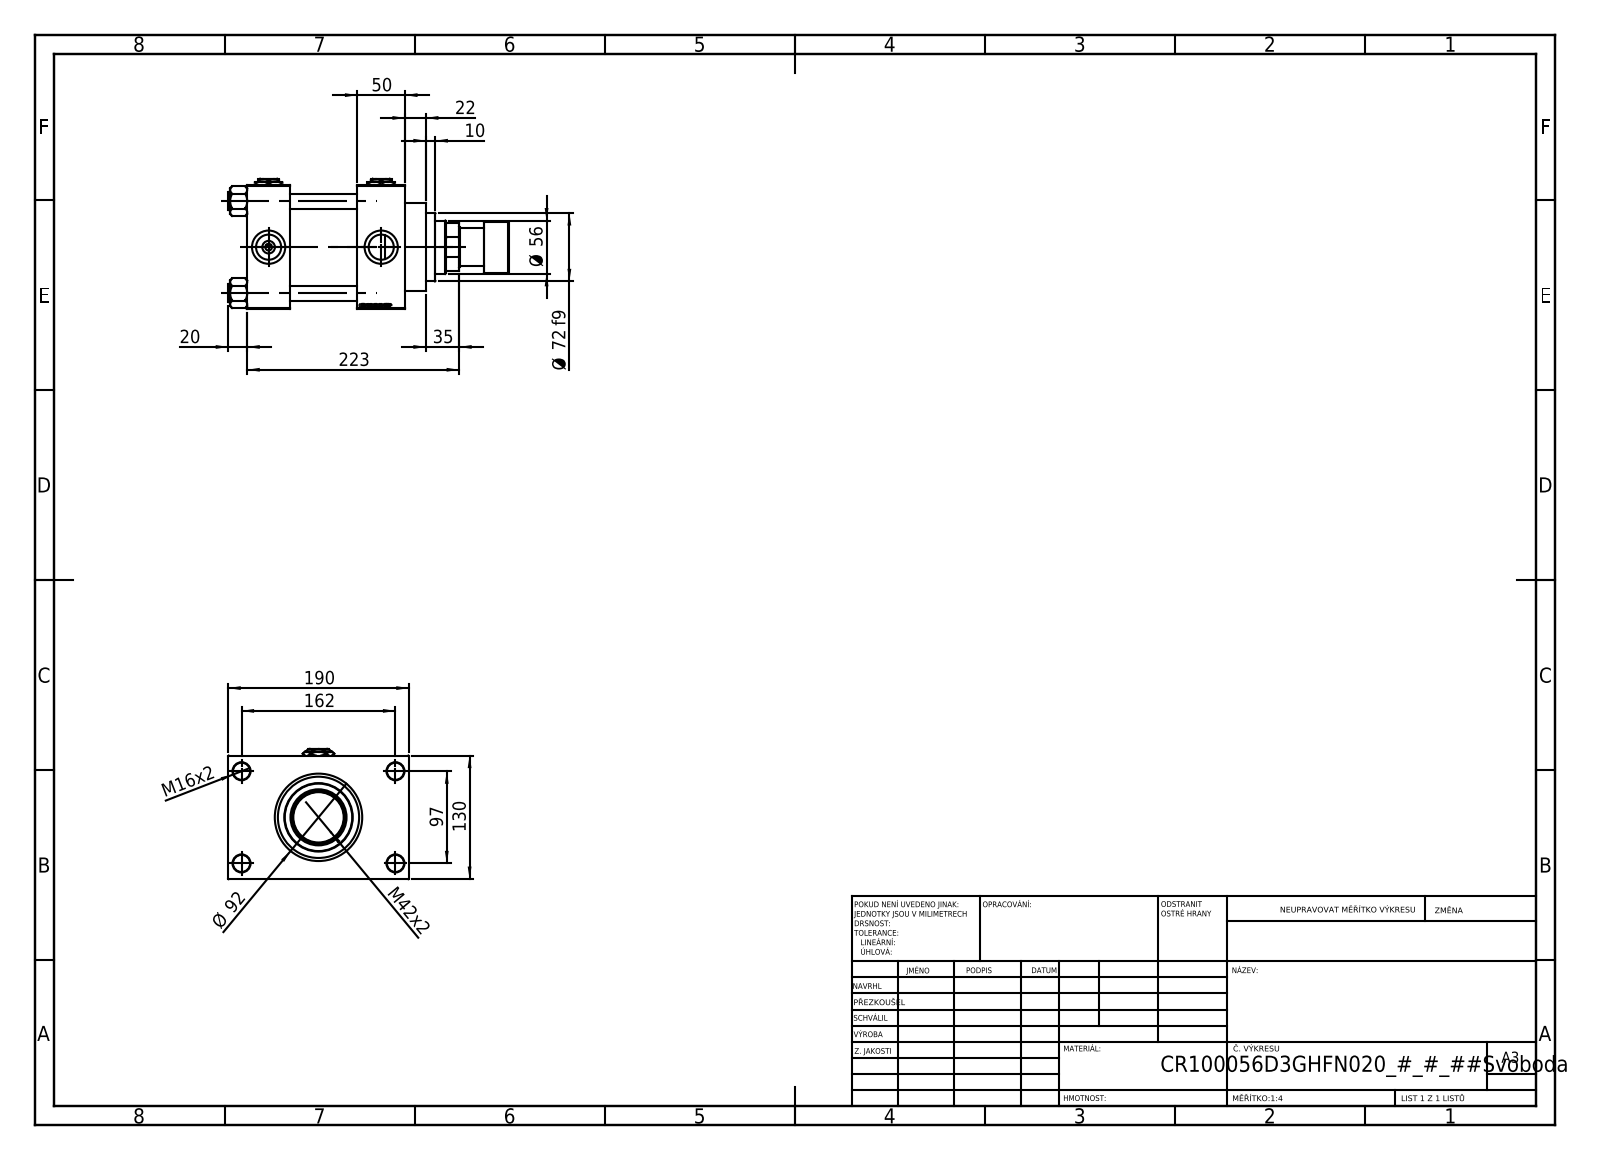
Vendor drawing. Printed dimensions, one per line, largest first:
223
190
162
130
97
Ø 92
Ø 72 f9
Ø 56
50
M42x2
35
22
20
M16x2
10
